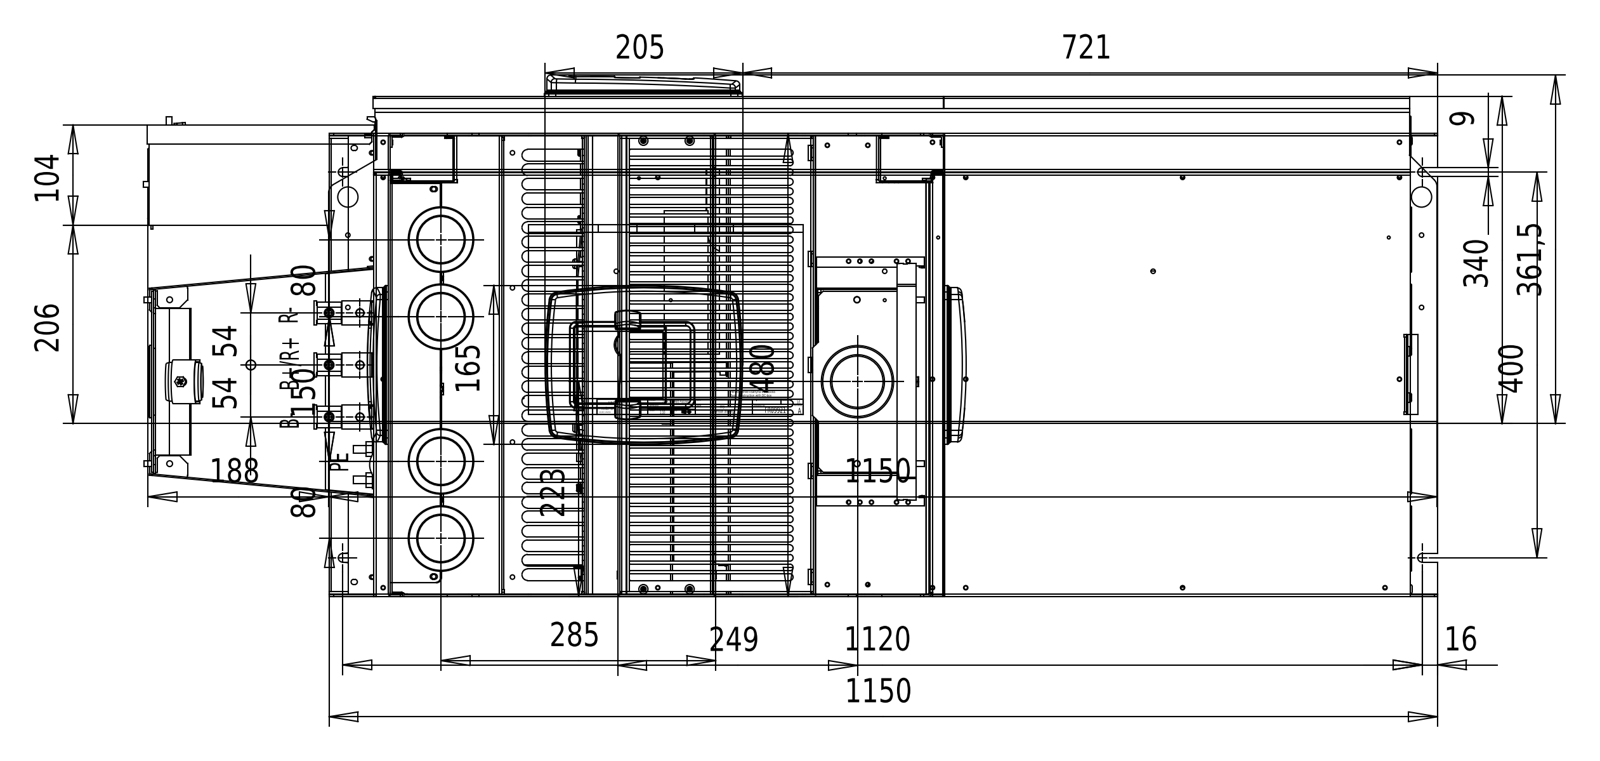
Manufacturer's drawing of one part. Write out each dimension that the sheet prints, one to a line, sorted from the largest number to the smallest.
1150
1150
1120
721
480
400
361,5
340
285
249
223
206
205
188
165
150
104
80
80
54
54
16
9
